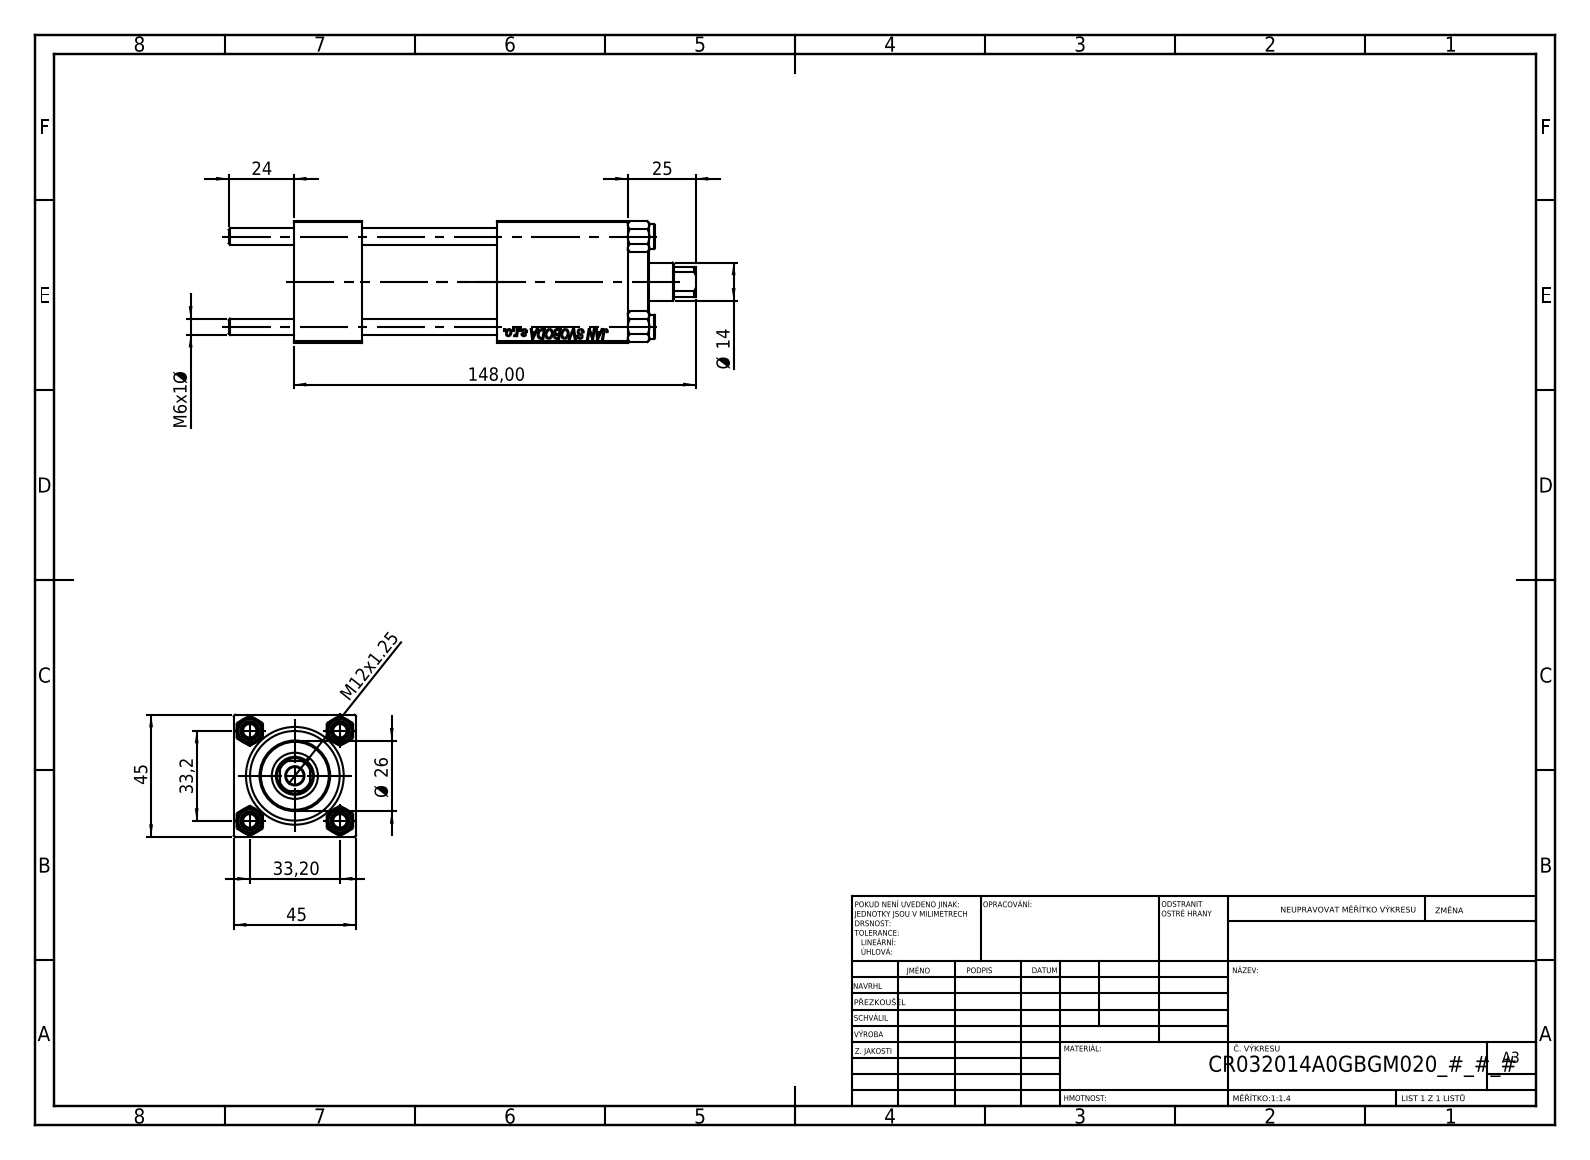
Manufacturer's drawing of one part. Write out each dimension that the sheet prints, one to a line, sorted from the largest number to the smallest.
148,00
45
45
33,2
33,20
Ø 26
25
24
Ø 14
M12x1.25
M6x1 Ø
